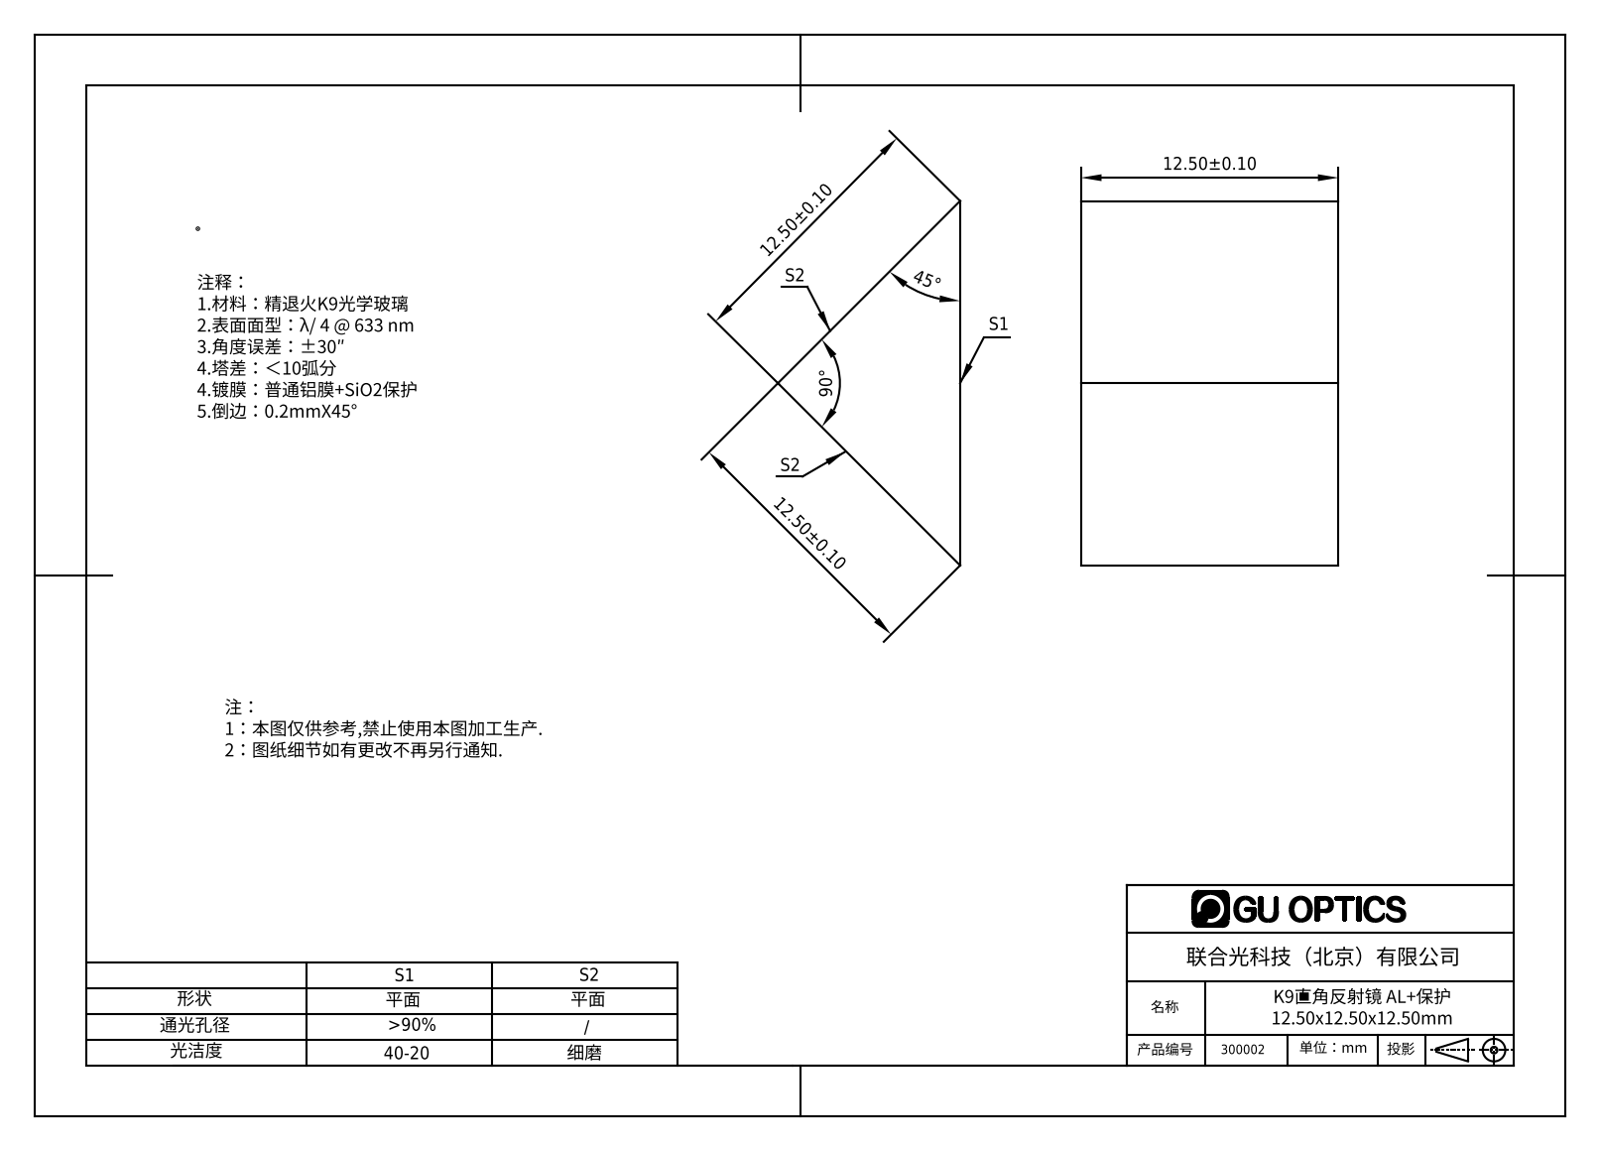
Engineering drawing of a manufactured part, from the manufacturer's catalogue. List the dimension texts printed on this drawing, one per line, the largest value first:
90°
45°
12.50±0.10
12.50±0.10
12.50±0.10
